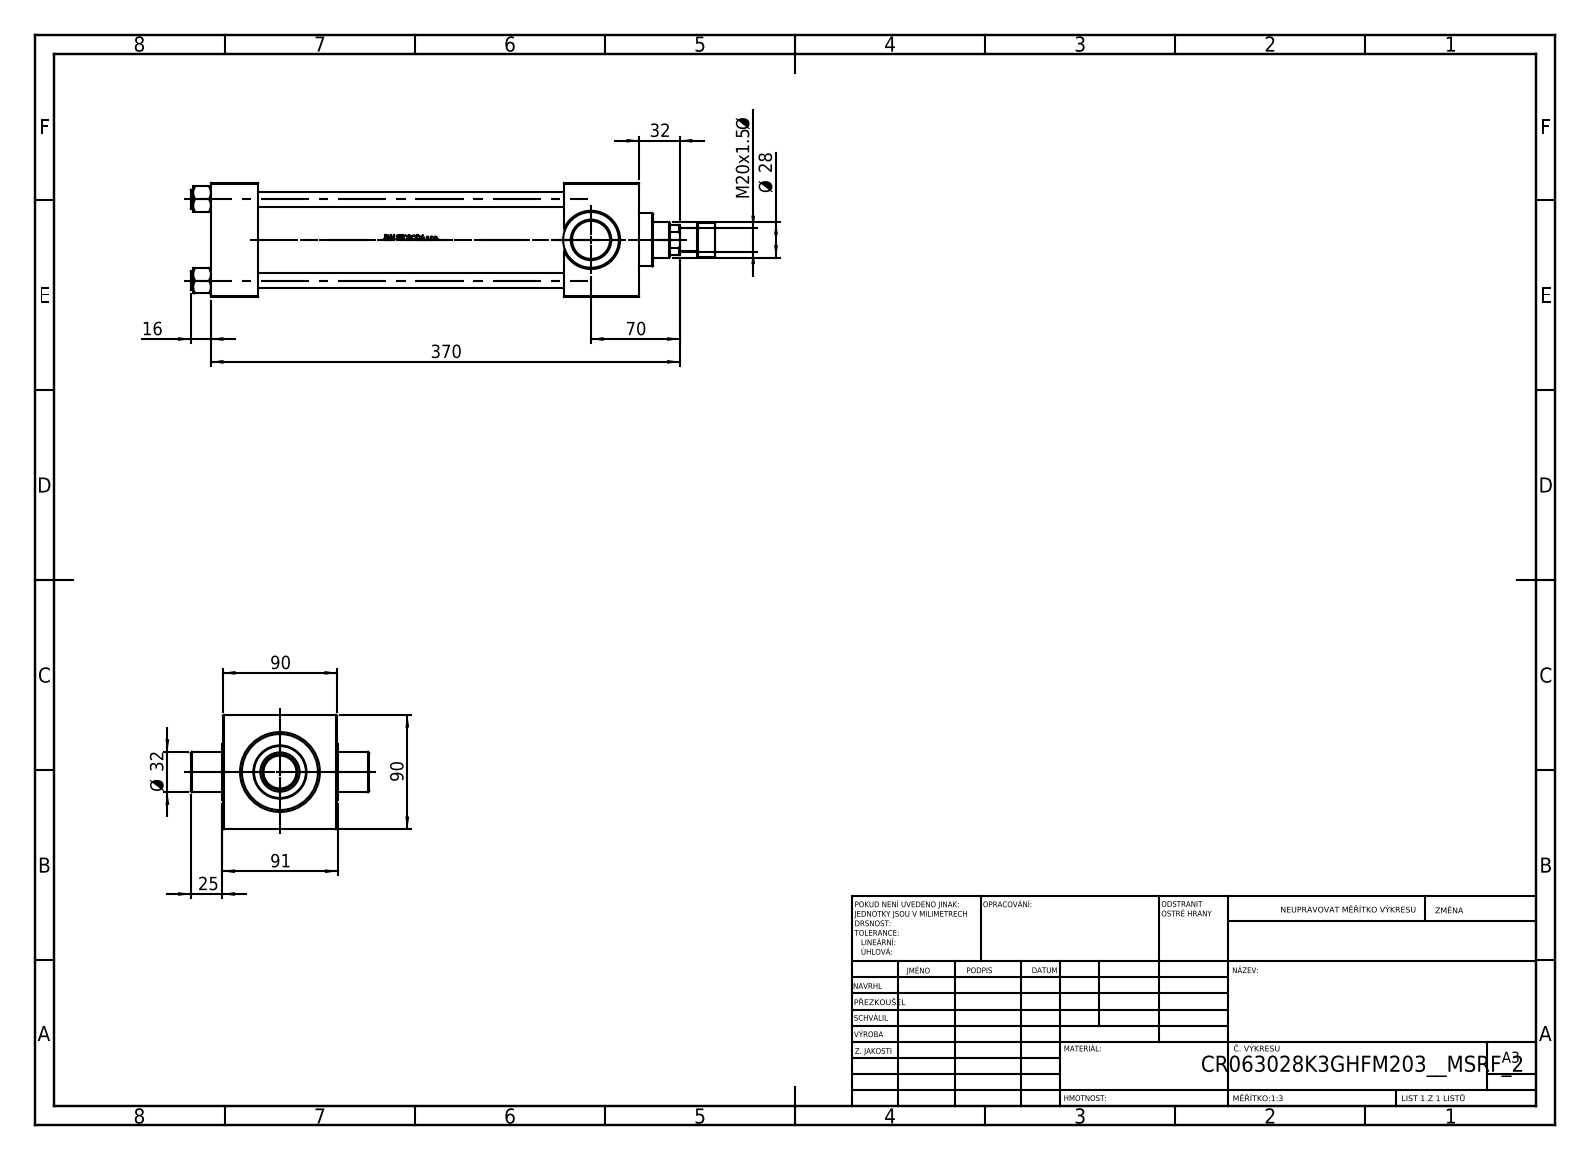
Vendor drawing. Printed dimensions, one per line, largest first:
370
91
90
90
70
32
Ø 32
Ø 28
25
M20x1.5 Ø
16
